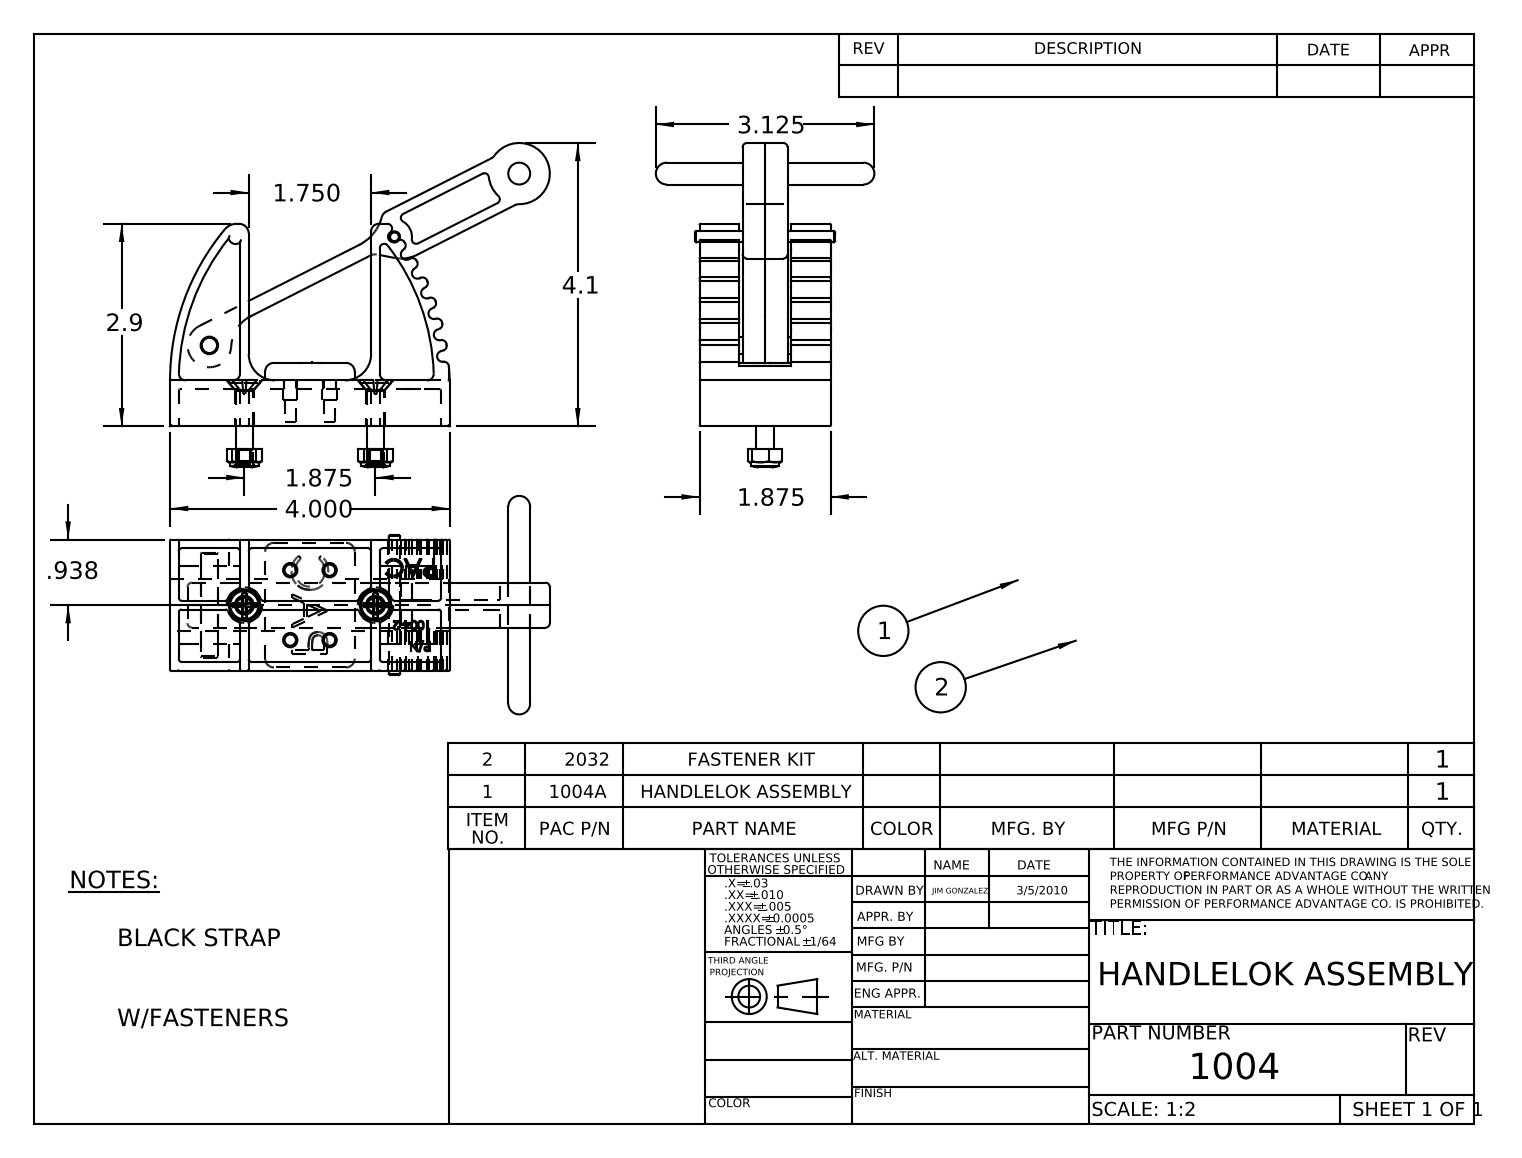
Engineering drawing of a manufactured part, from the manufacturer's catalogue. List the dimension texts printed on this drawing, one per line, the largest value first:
4.1
4.000
3.125
2.9
1.875
1.875
1.750
.938
